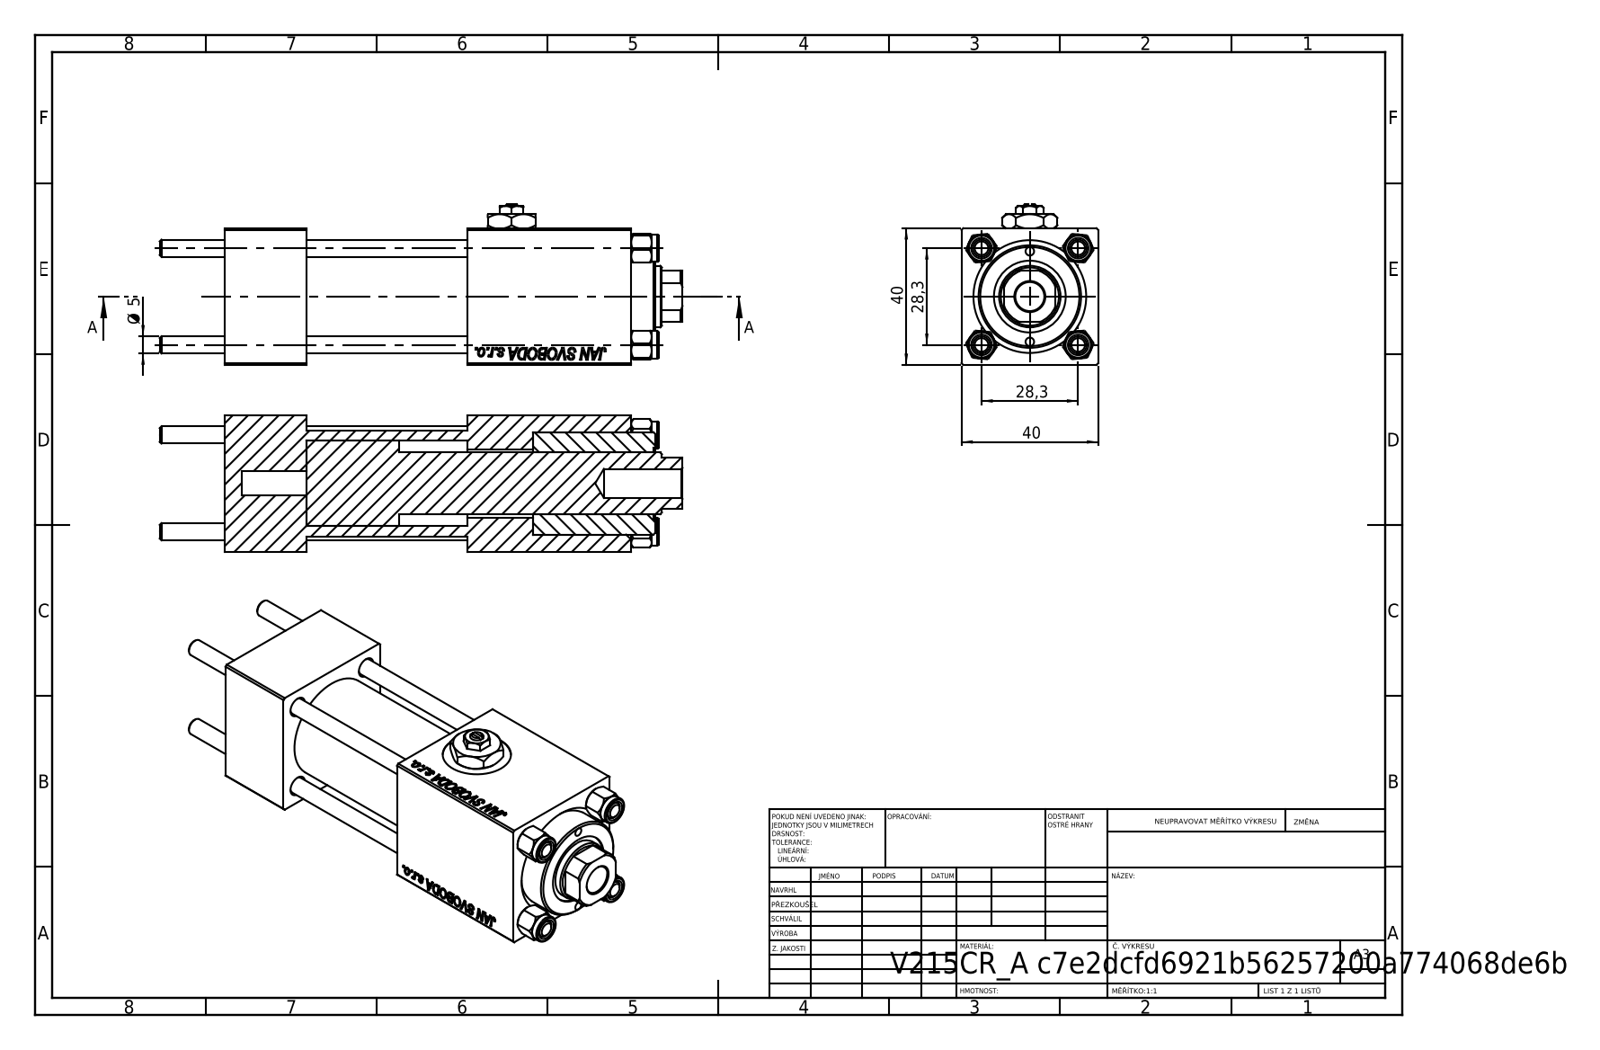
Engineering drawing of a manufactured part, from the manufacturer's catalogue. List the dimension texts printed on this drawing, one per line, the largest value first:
40
40
28,3
28,3
Ø 5
